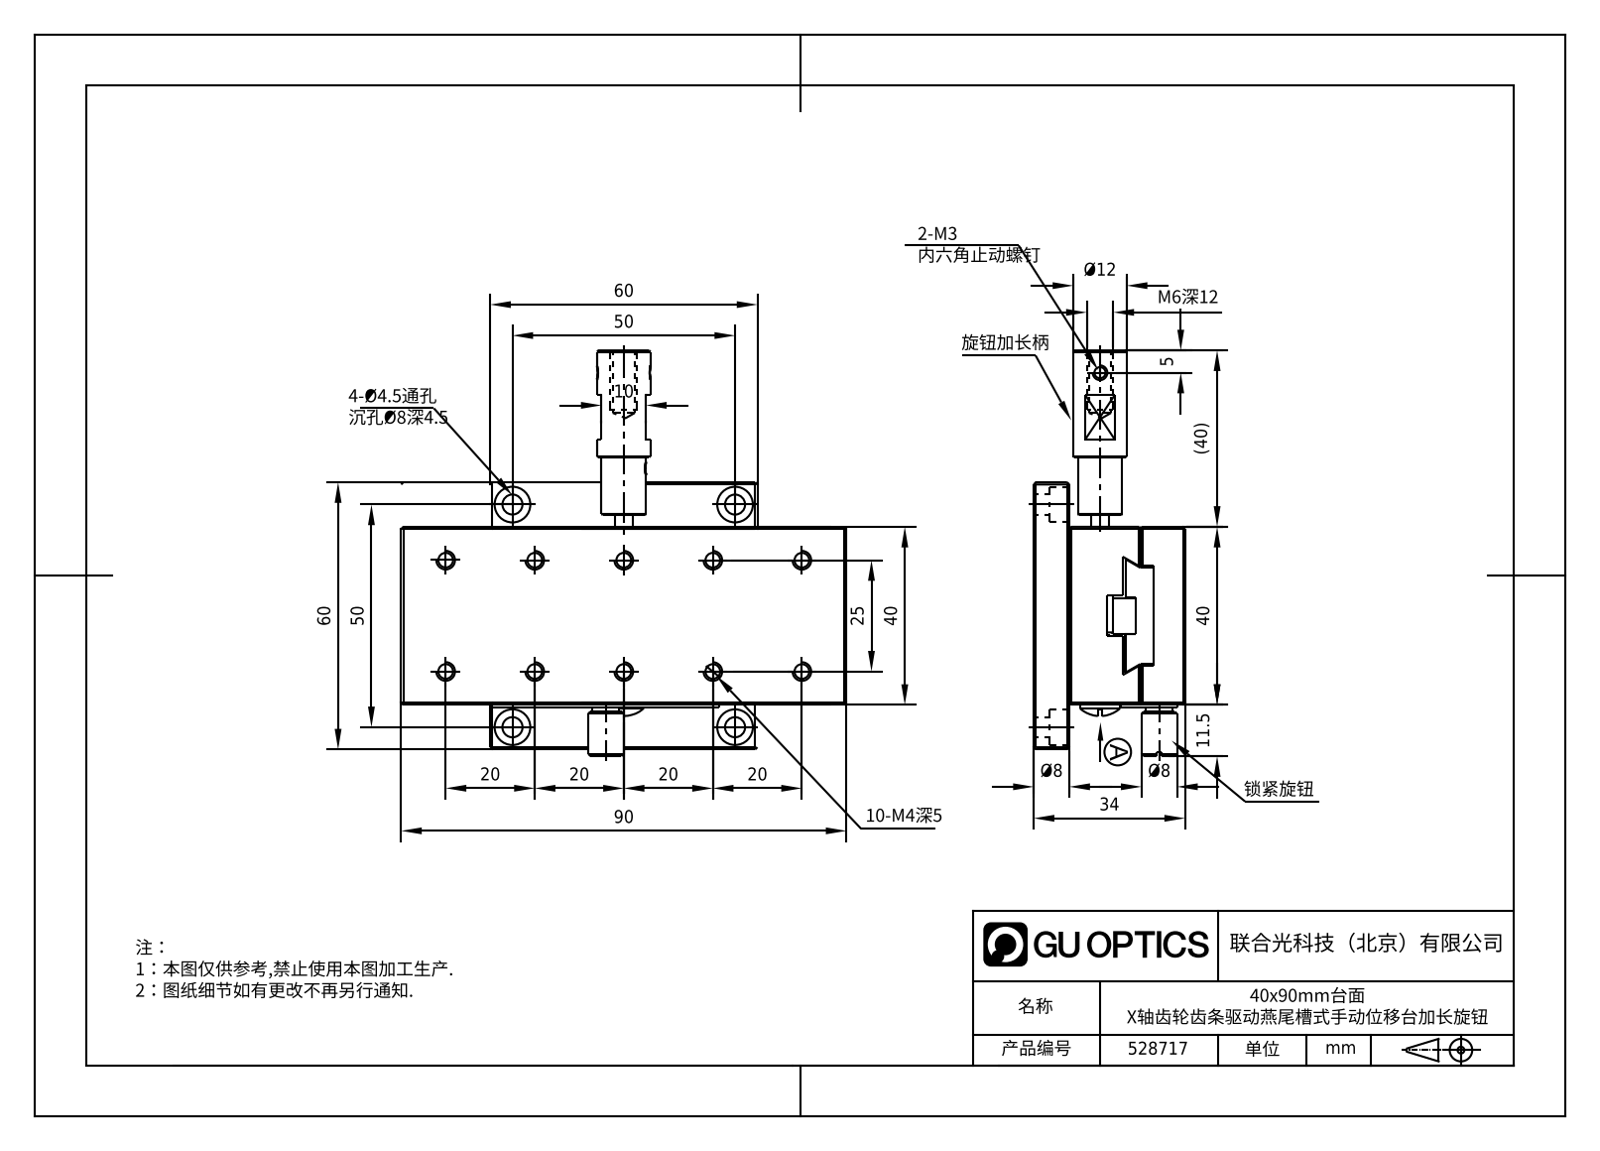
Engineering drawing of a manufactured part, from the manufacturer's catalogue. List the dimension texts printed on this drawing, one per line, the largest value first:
90
60
60
50
50
40
(40)
40
34
25
20
20
20
20
Ø12
11.5
10
Ø8
Ø8
M6深12
5
